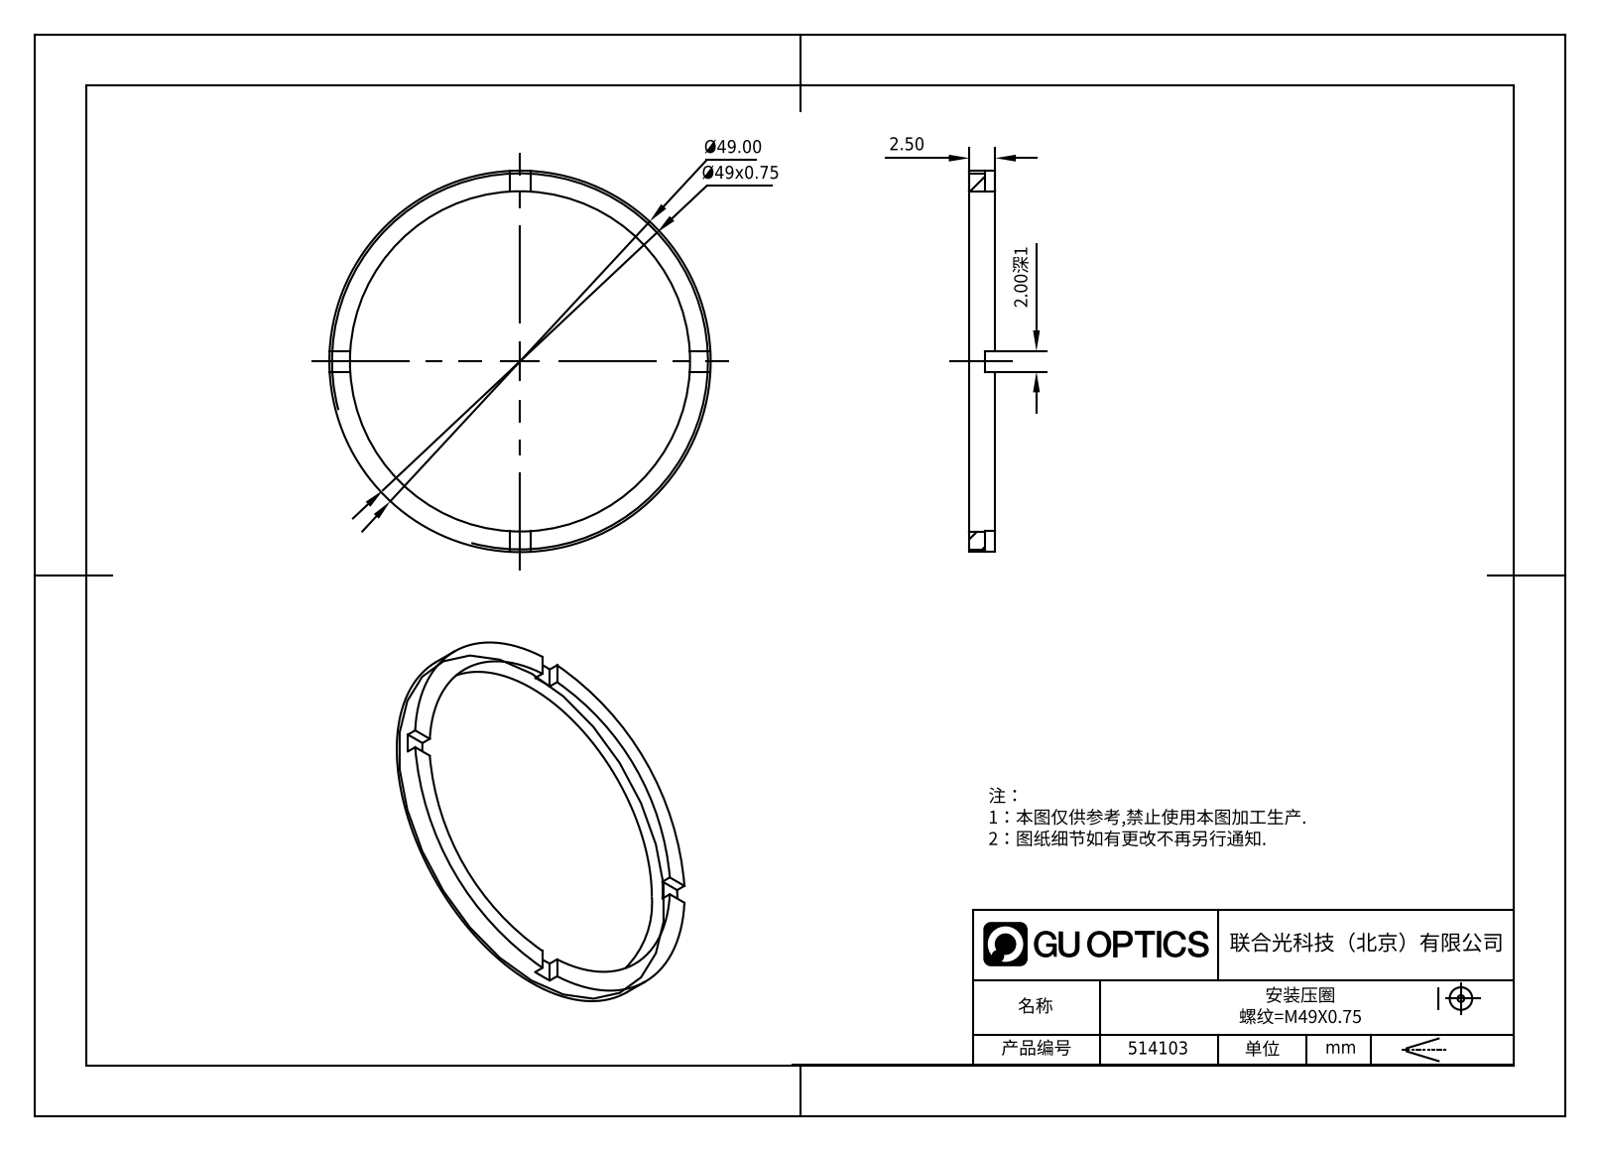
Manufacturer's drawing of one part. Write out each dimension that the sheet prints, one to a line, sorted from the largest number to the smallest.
Ø49.00
Ø49x0.75
2.50
2.00深1
